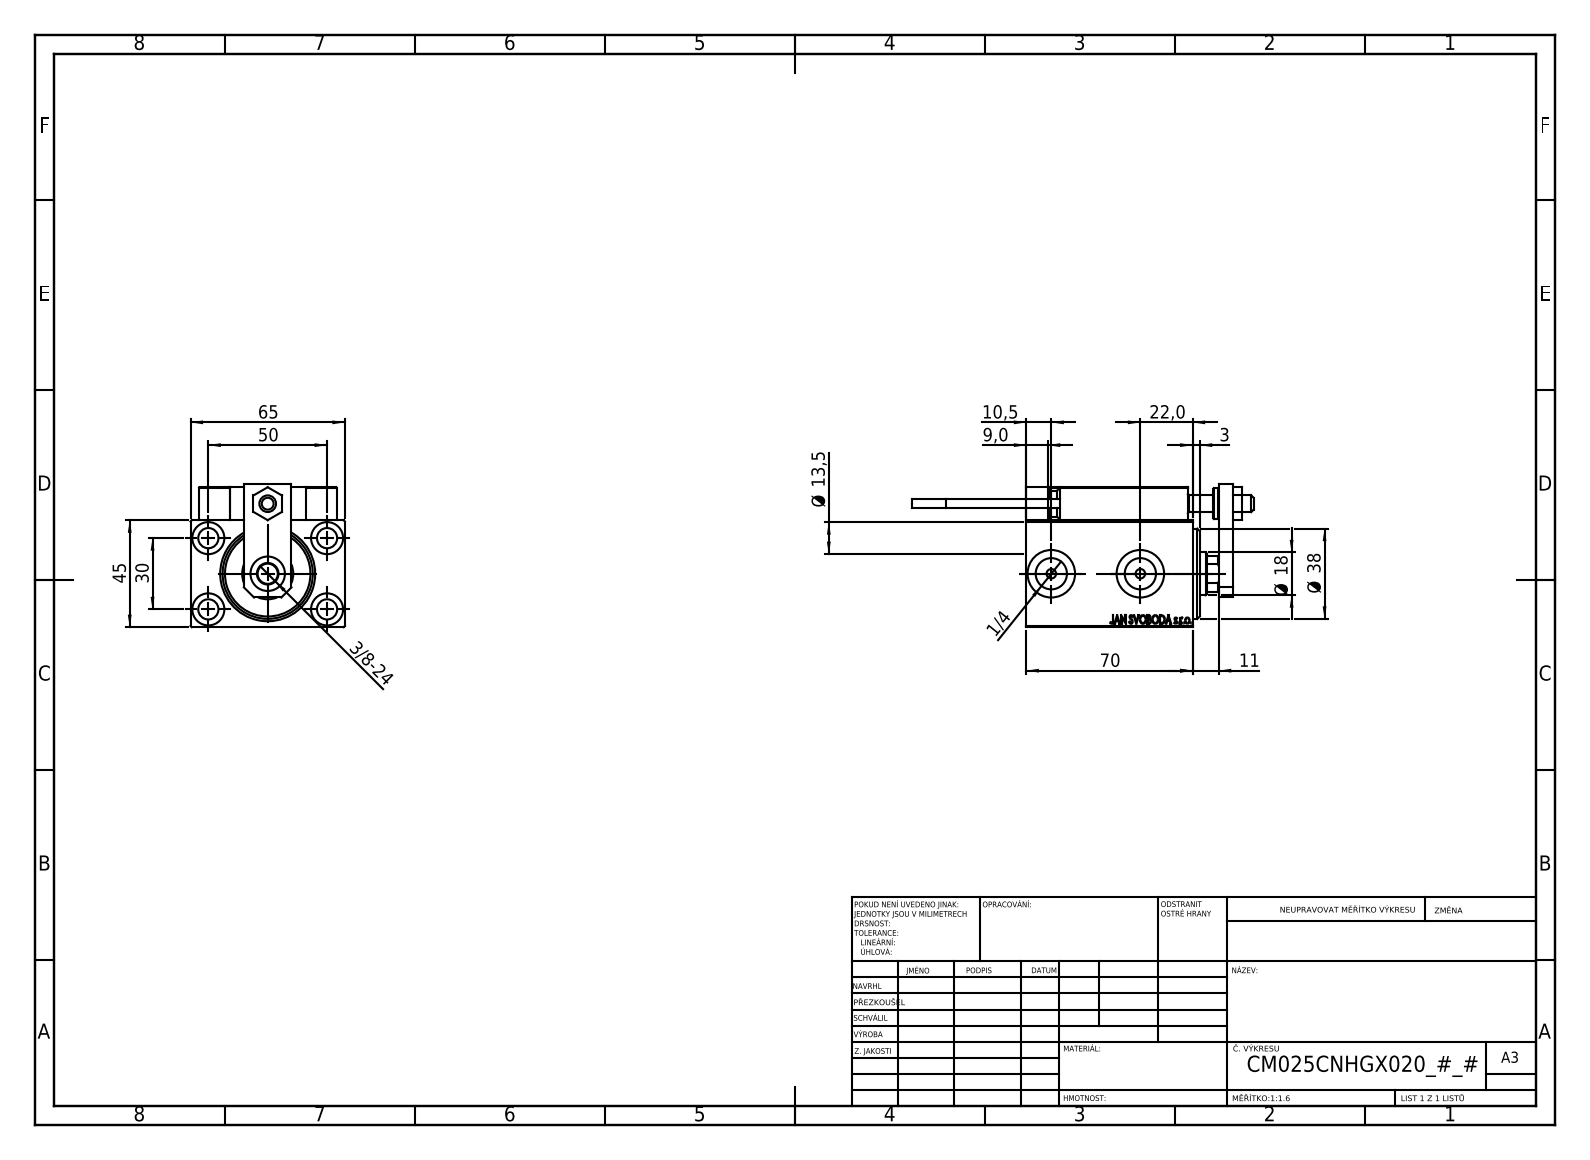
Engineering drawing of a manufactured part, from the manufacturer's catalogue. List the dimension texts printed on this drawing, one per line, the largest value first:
70
65
50
45
Ø 38
30
22,0
Ø 18
Ø 13,5
11
10,5
9,0
3
3/8-24
1/4
